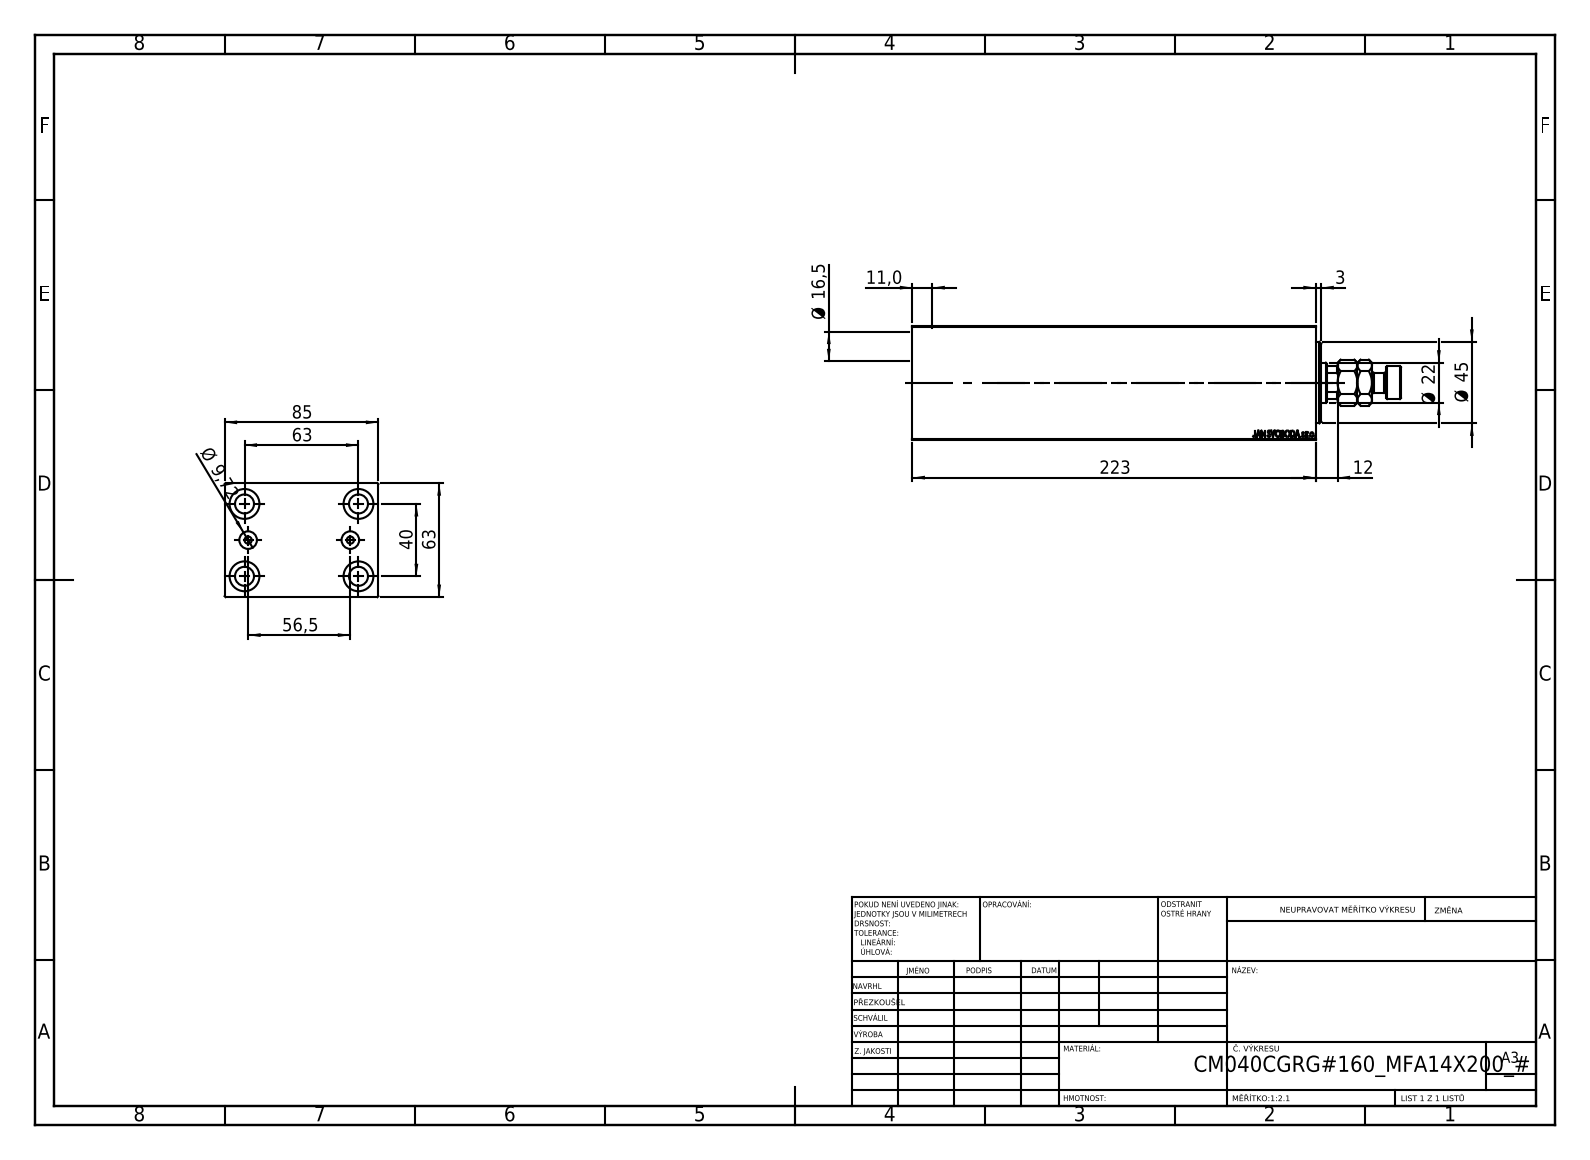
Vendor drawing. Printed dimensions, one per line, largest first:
223
85
63
63
56,5
Ø 45
40
Ø 22
Ø 16,5
12
11,0
Ø 9,72
3
